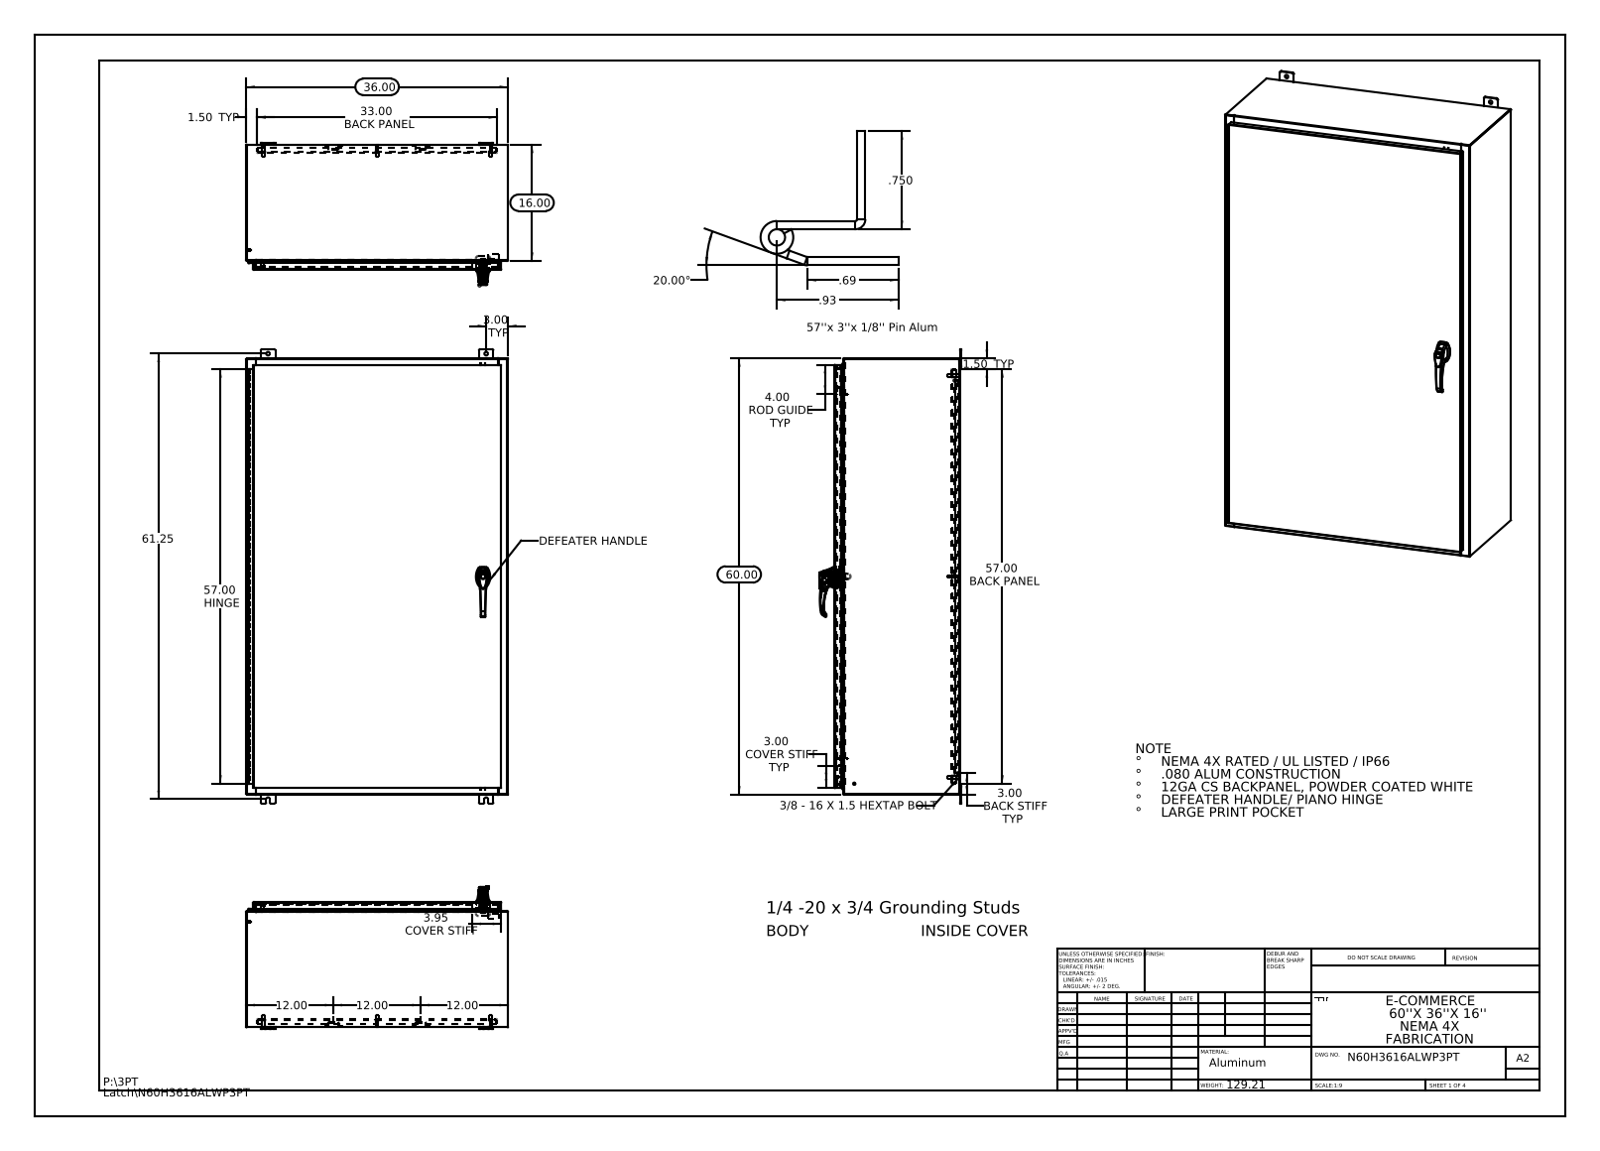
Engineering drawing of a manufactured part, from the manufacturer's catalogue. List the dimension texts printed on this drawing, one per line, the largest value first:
61.25
60.00
57.00 HINGE
57.00 BACK PANEL
36.00
33.00 BACK PANEL
20.00°
16.00
12.00
12.00
12.00
4.00 ROD GUIDE TYP
3.95 COVER STIFF
3.00 TYP
3.00 BACK STIFF TYP
3.00 COVER STIFF TYP
1.50 TYP
1.50 TYP
.93
.750
.69
